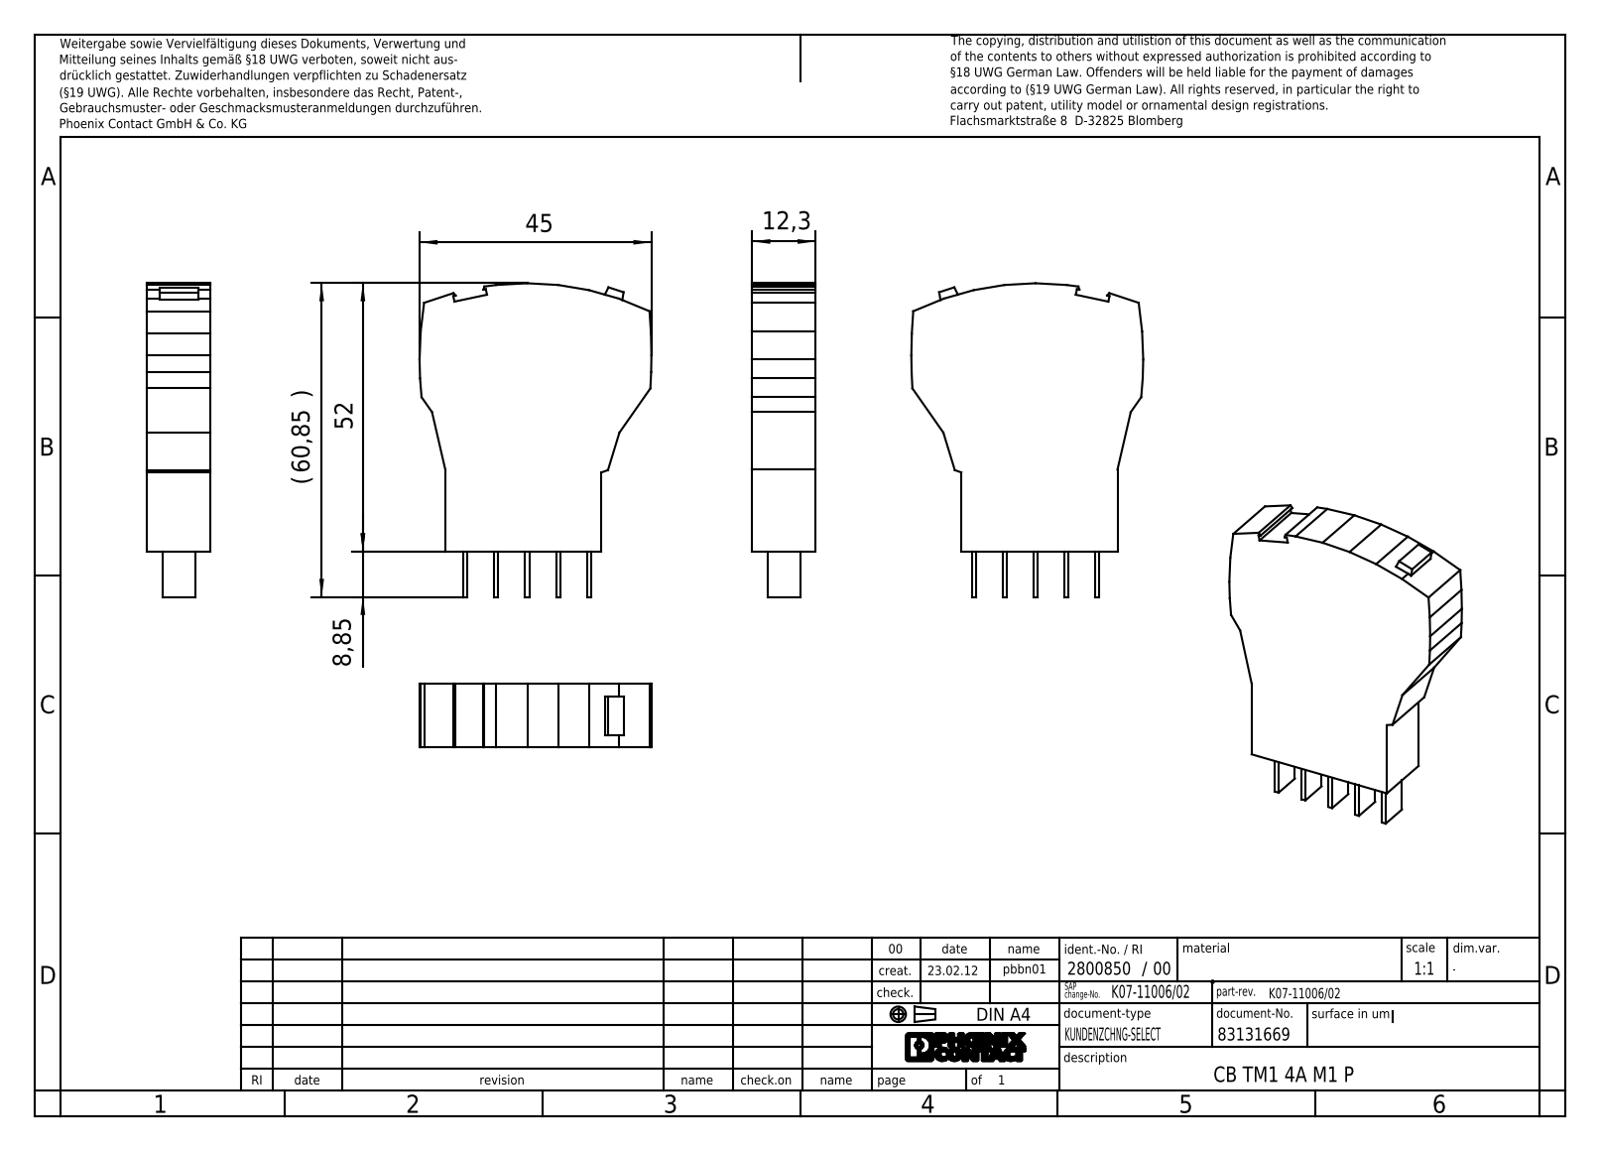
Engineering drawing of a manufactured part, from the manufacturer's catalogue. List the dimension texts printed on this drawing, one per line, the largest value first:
) ( 60,85
52
45
12,3
8,85
